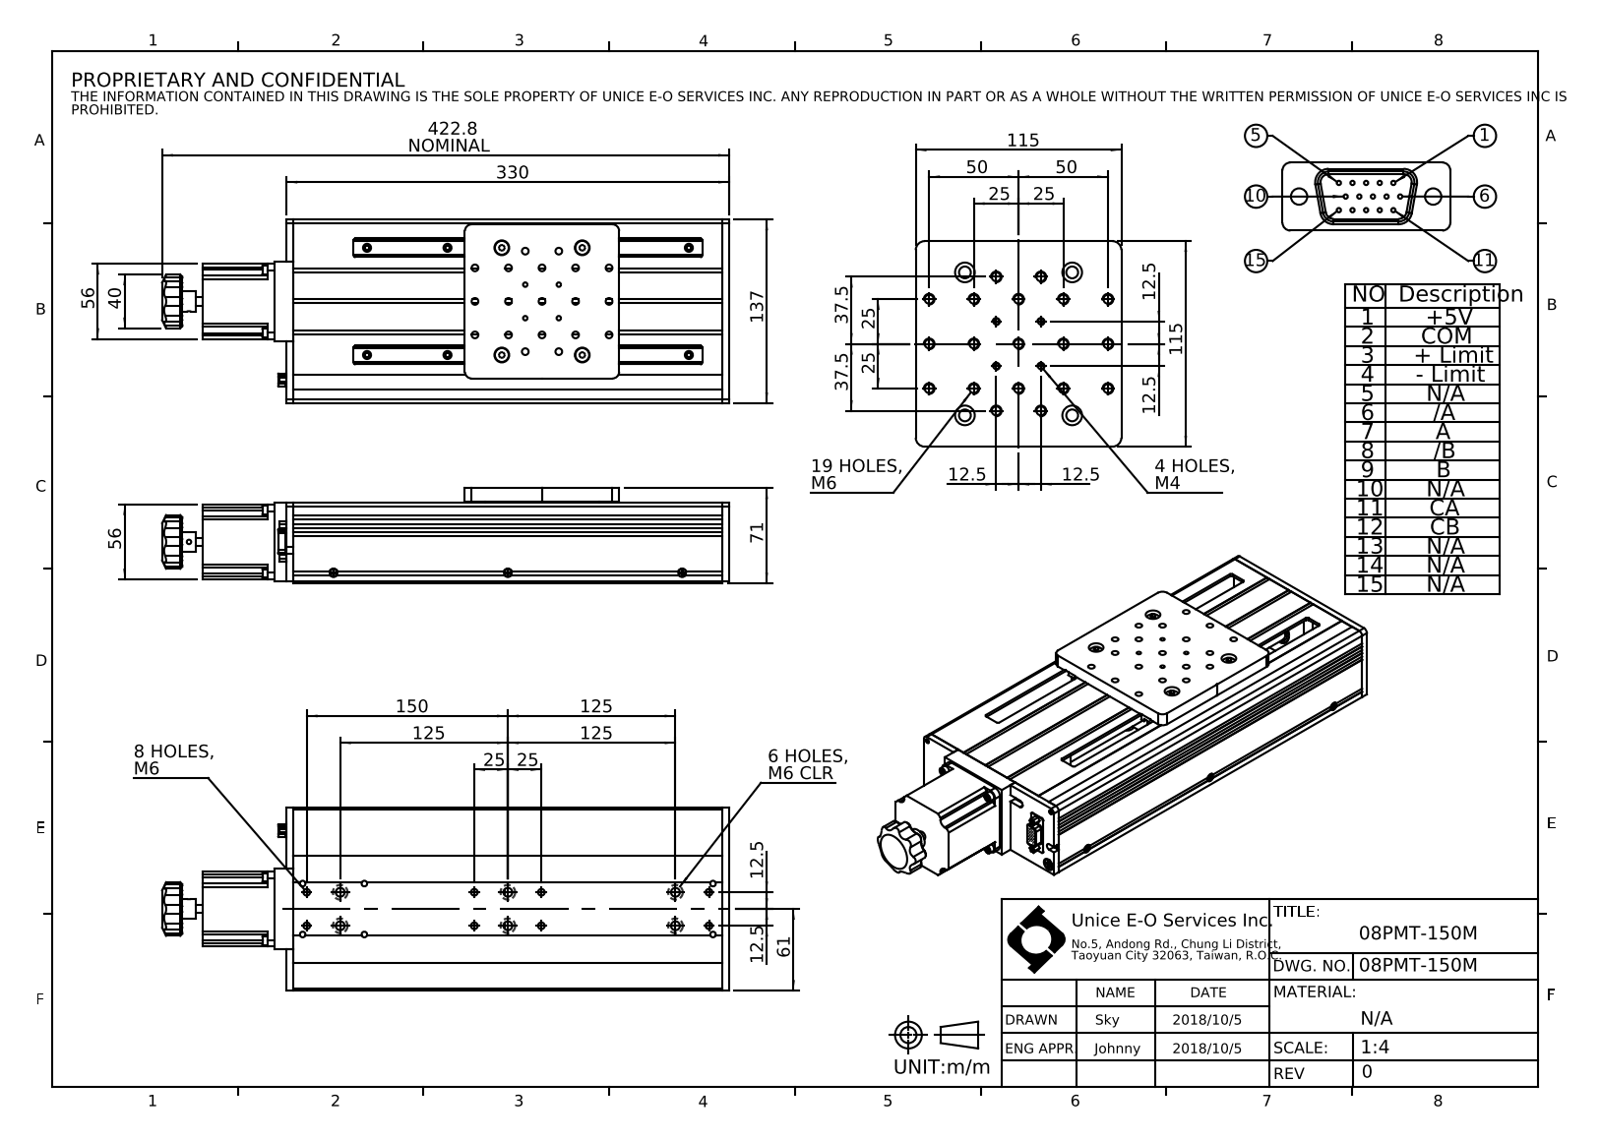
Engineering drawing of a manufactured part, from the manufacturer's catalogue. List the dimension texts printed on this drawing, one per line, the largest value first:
422.8 NOMINAL
330
150
137
125
125
125
115
115
71
61
56
56
50
50
40
37.5
37.5
25
25
25
25
25
25
19 HOLES, M6
12.5
12.5
12.5
12.5
12.5
12.5
8 HOLES, M6
6 HOLES, M6 CLR
4 HOLES, M4
